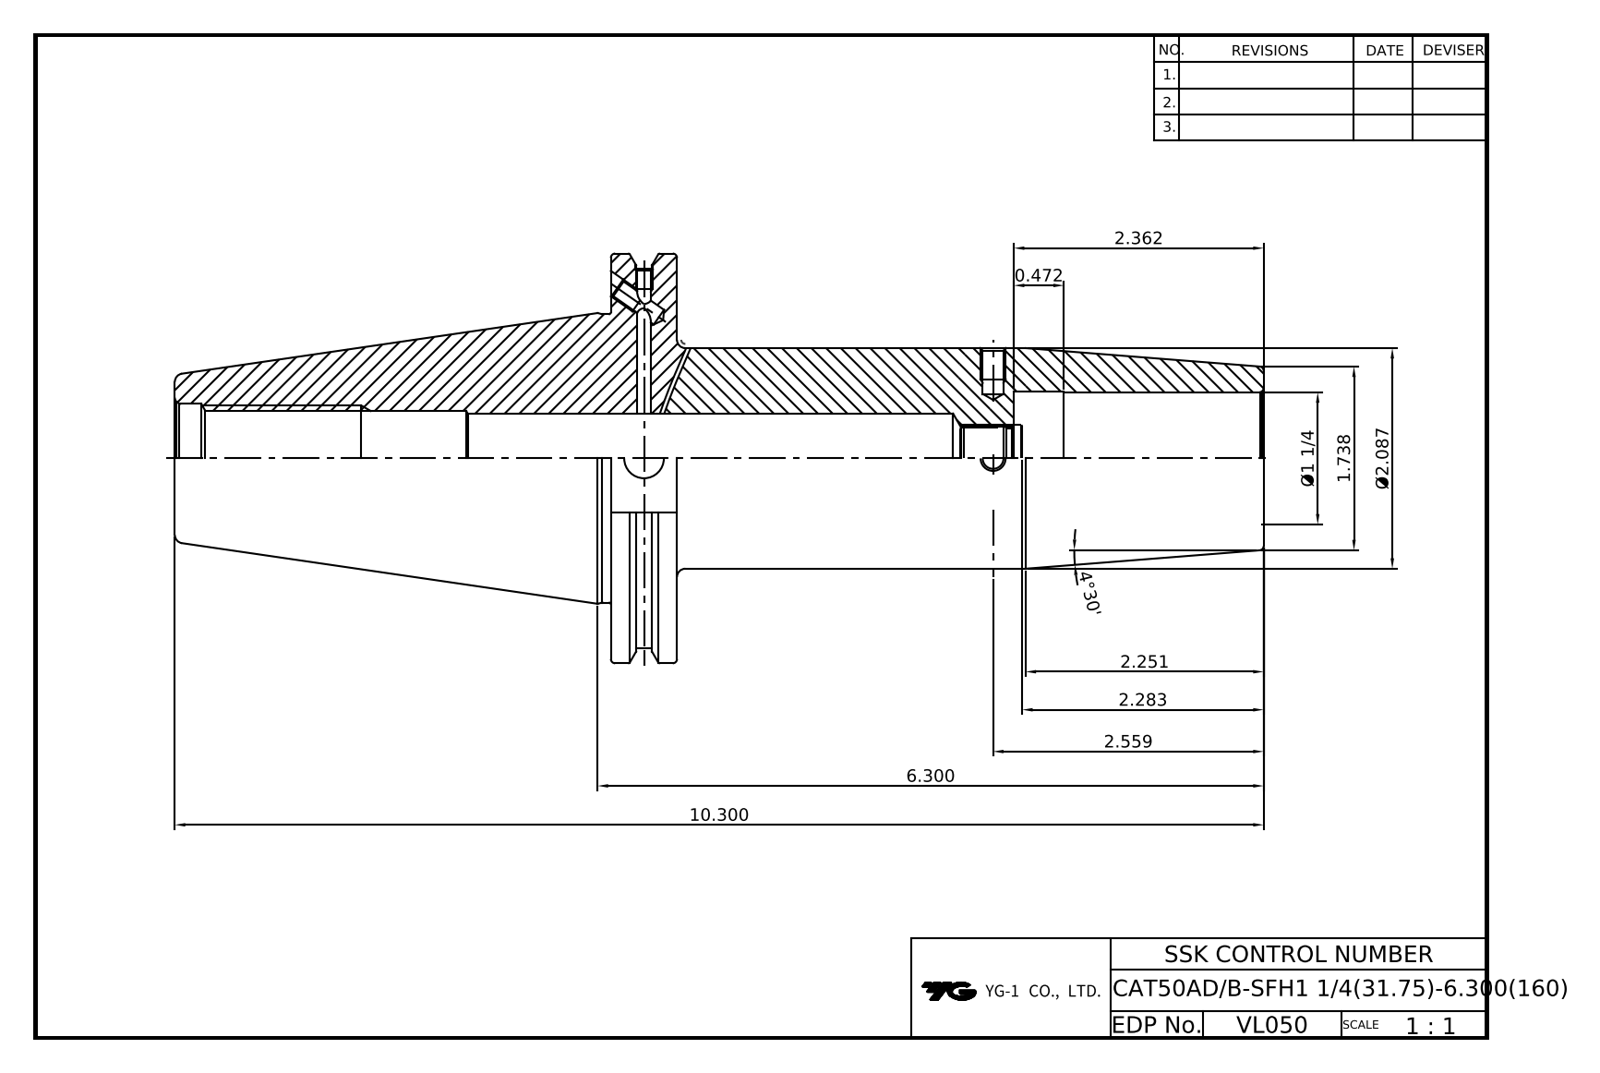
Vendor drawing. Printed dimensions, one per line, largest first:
10.300
6.300
4°30'
2.559
2.362
2.283
2.251
Ø2.087
1.738
Ø1 1/4
0.472
